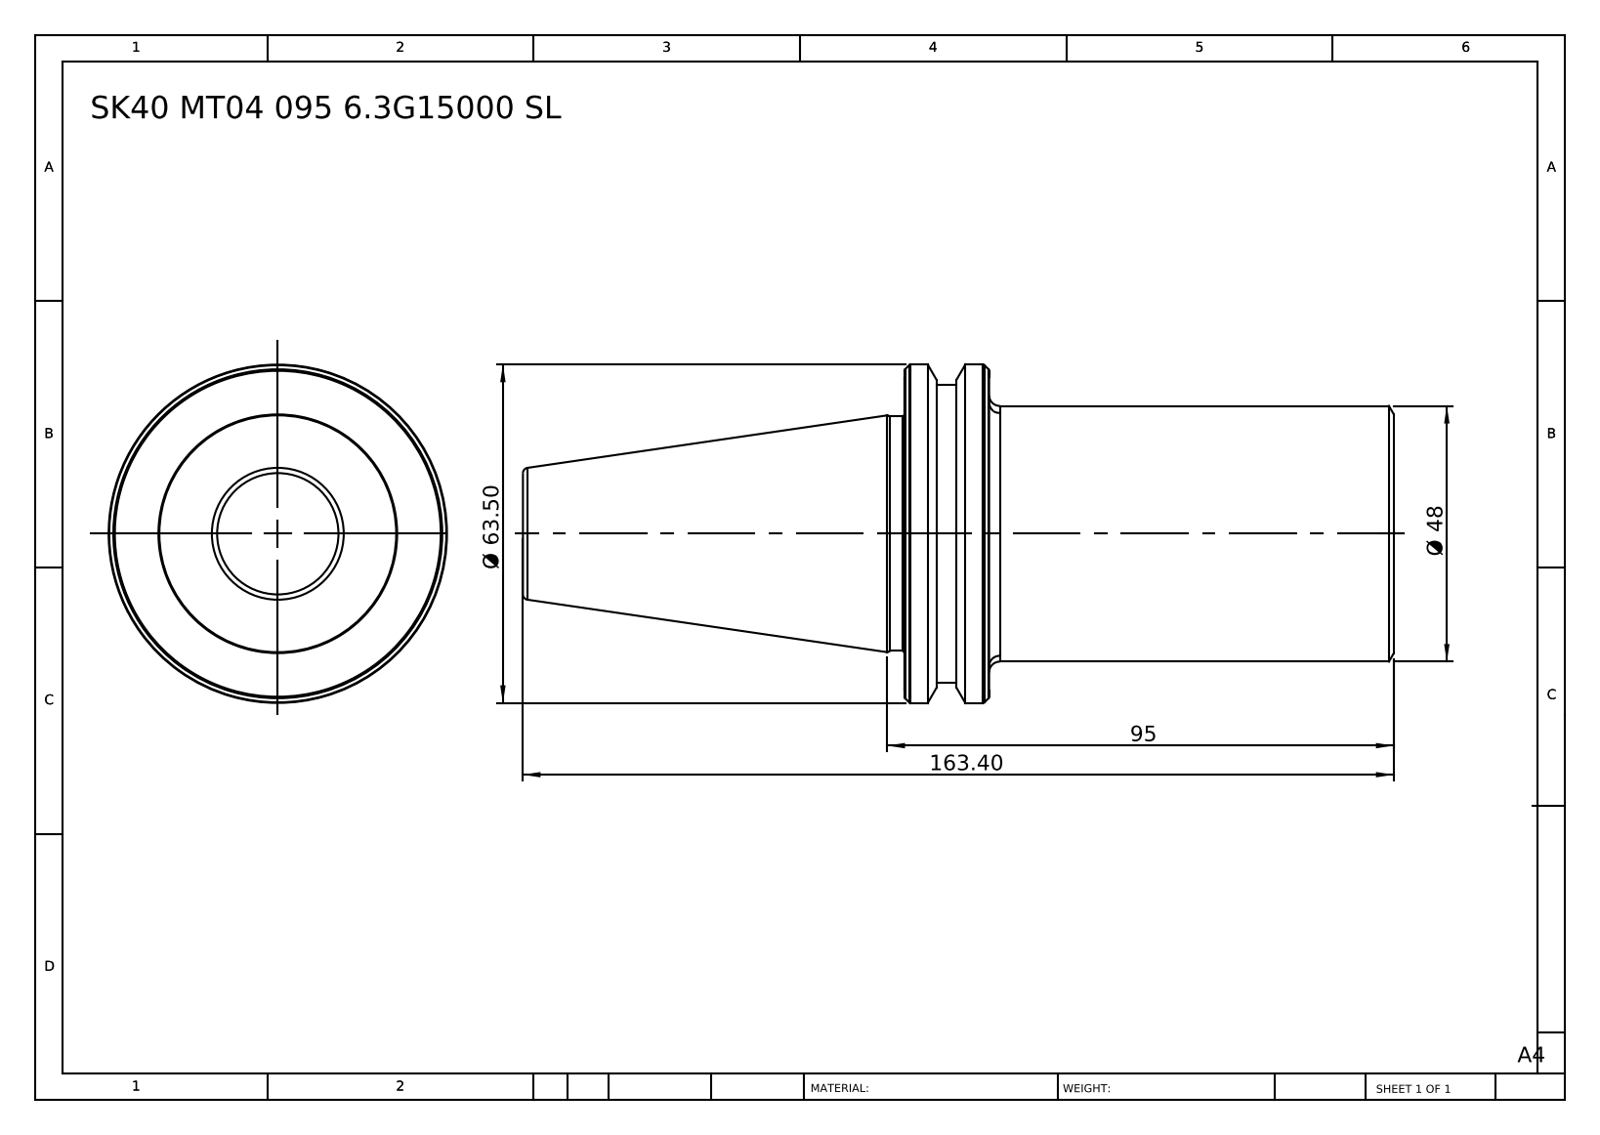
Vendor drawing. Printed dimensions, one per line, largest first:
163.40
95
Ø 63.50
Ø 48
